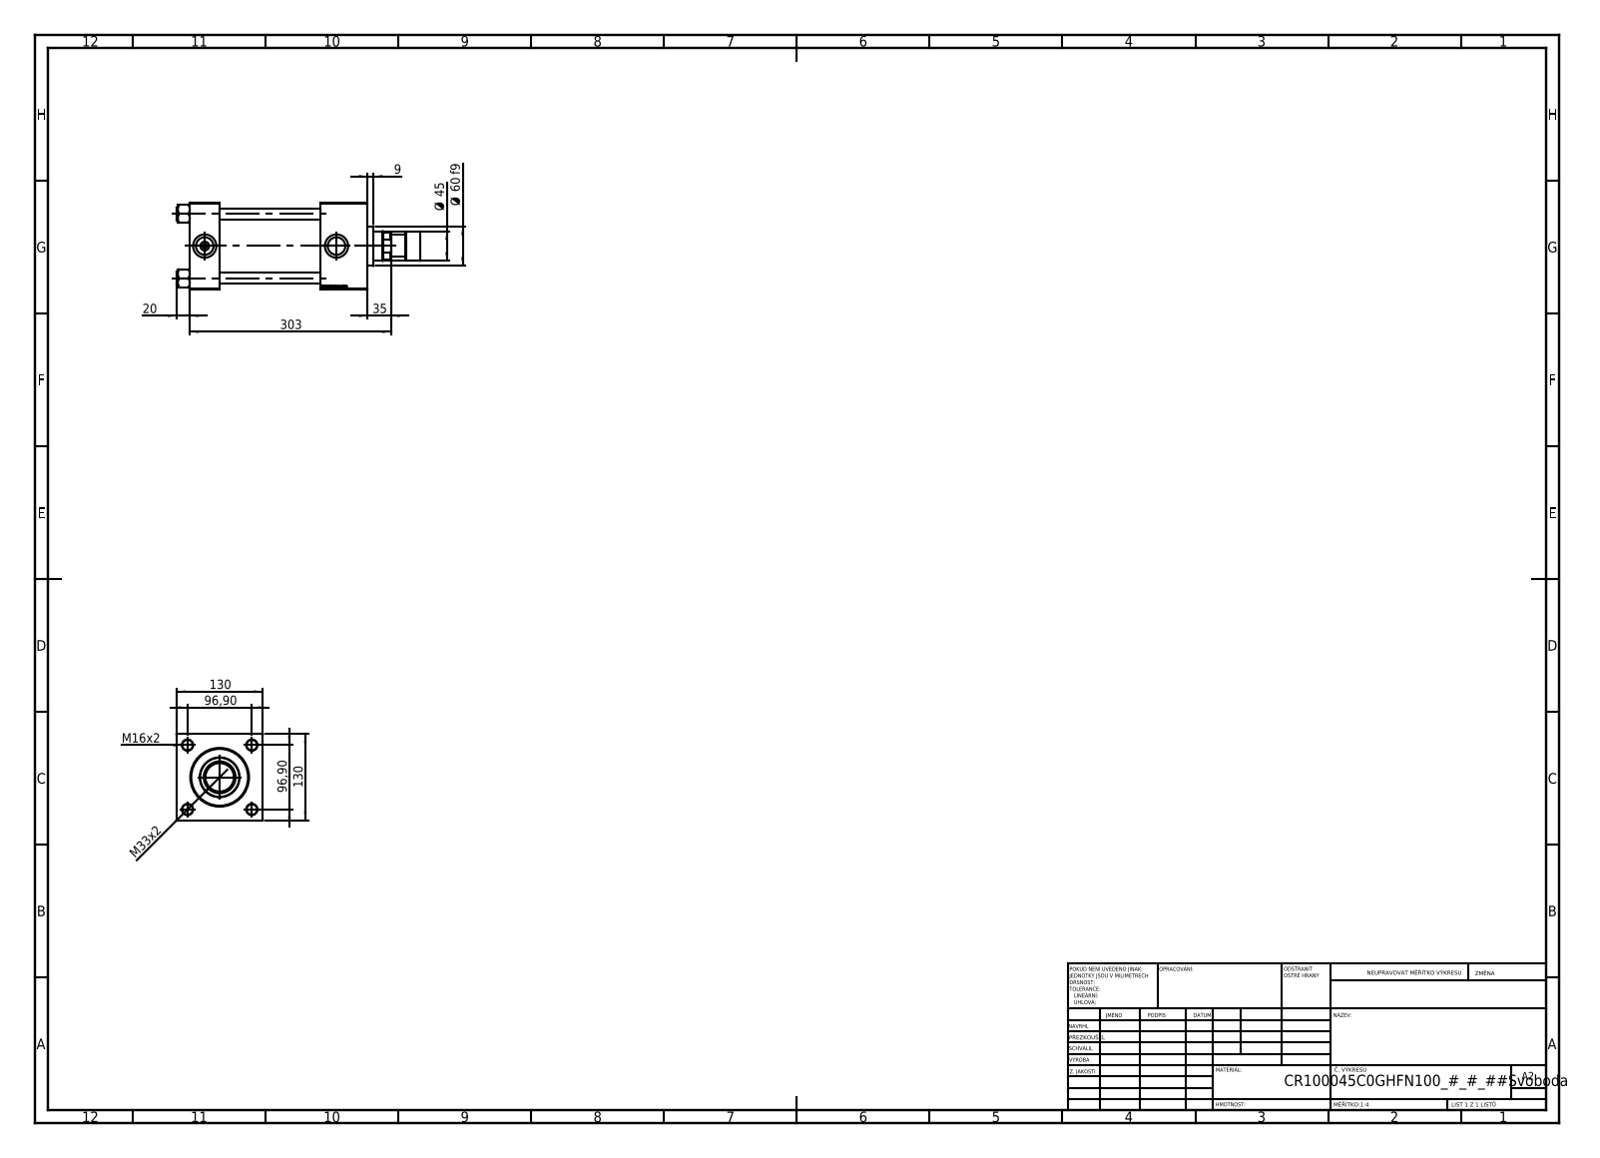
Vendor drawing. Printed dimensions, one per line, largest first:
303
130
130
96,90
96,90
Ø 60 f9
Ø 45
35
M33x2
20
M16x2
9
